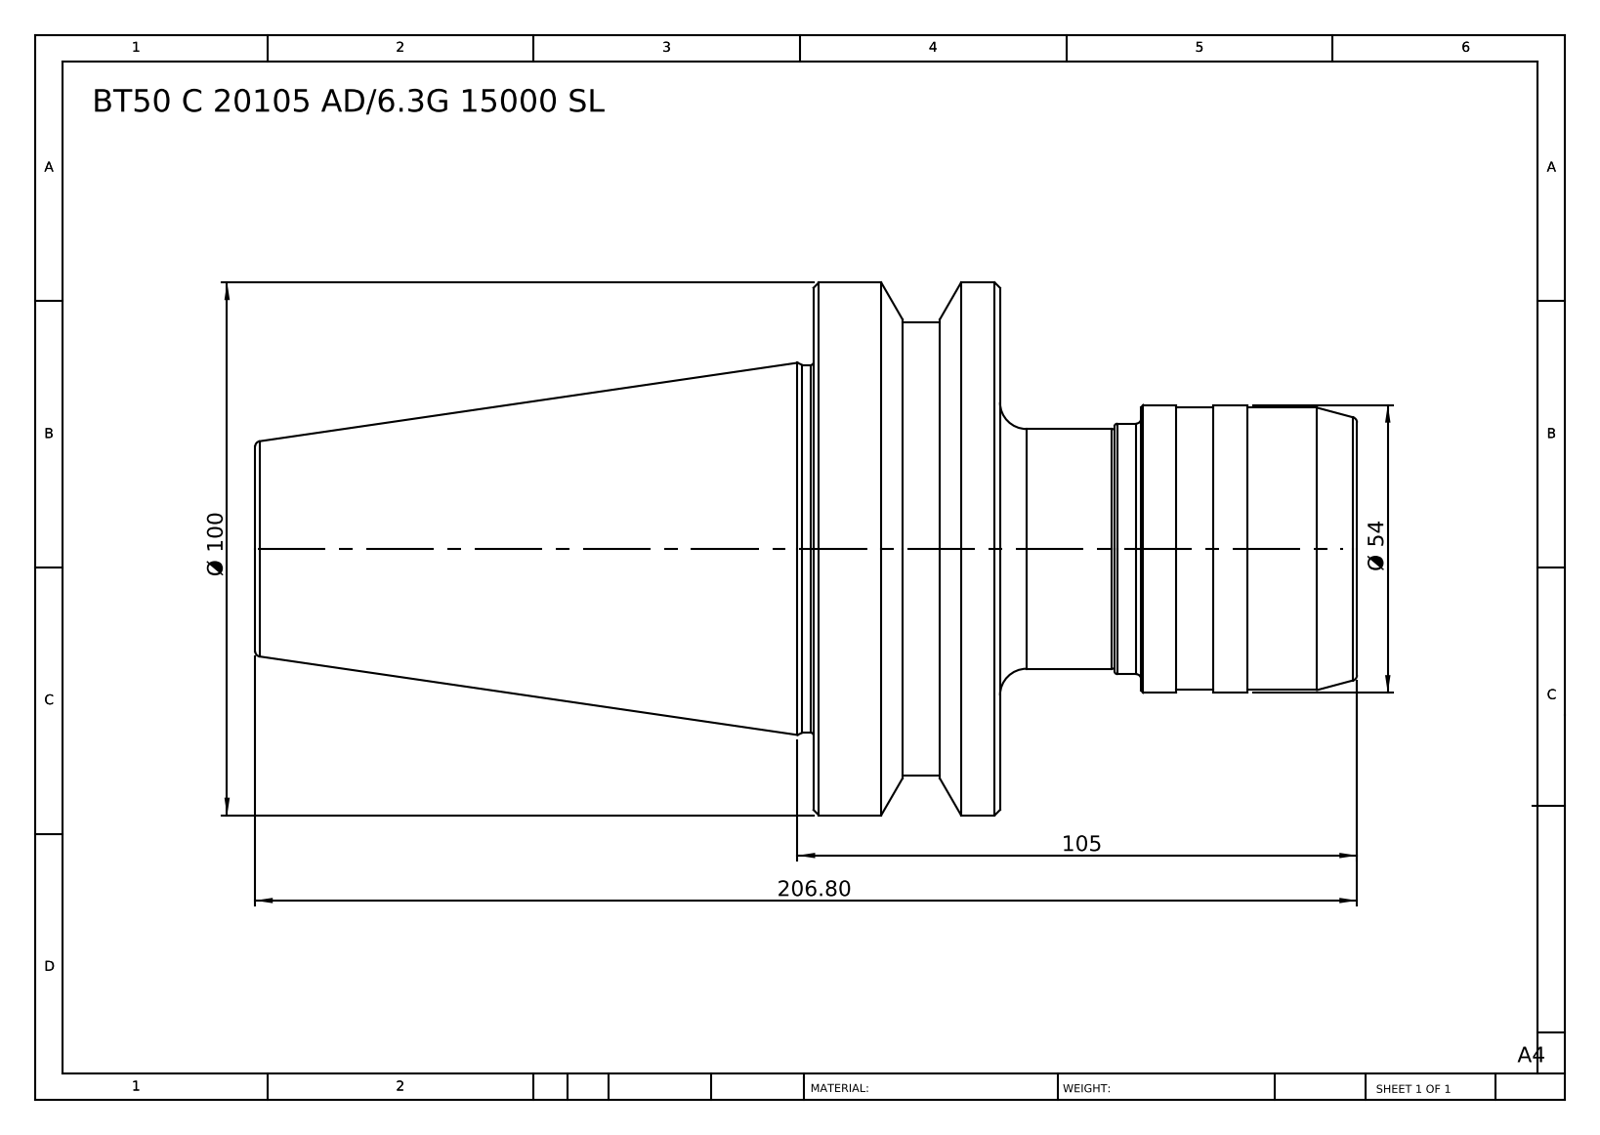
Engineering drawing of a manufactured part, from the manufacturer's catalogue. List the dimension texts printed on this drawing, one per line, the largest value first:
206.80
105
Ø 100
Ø 54
